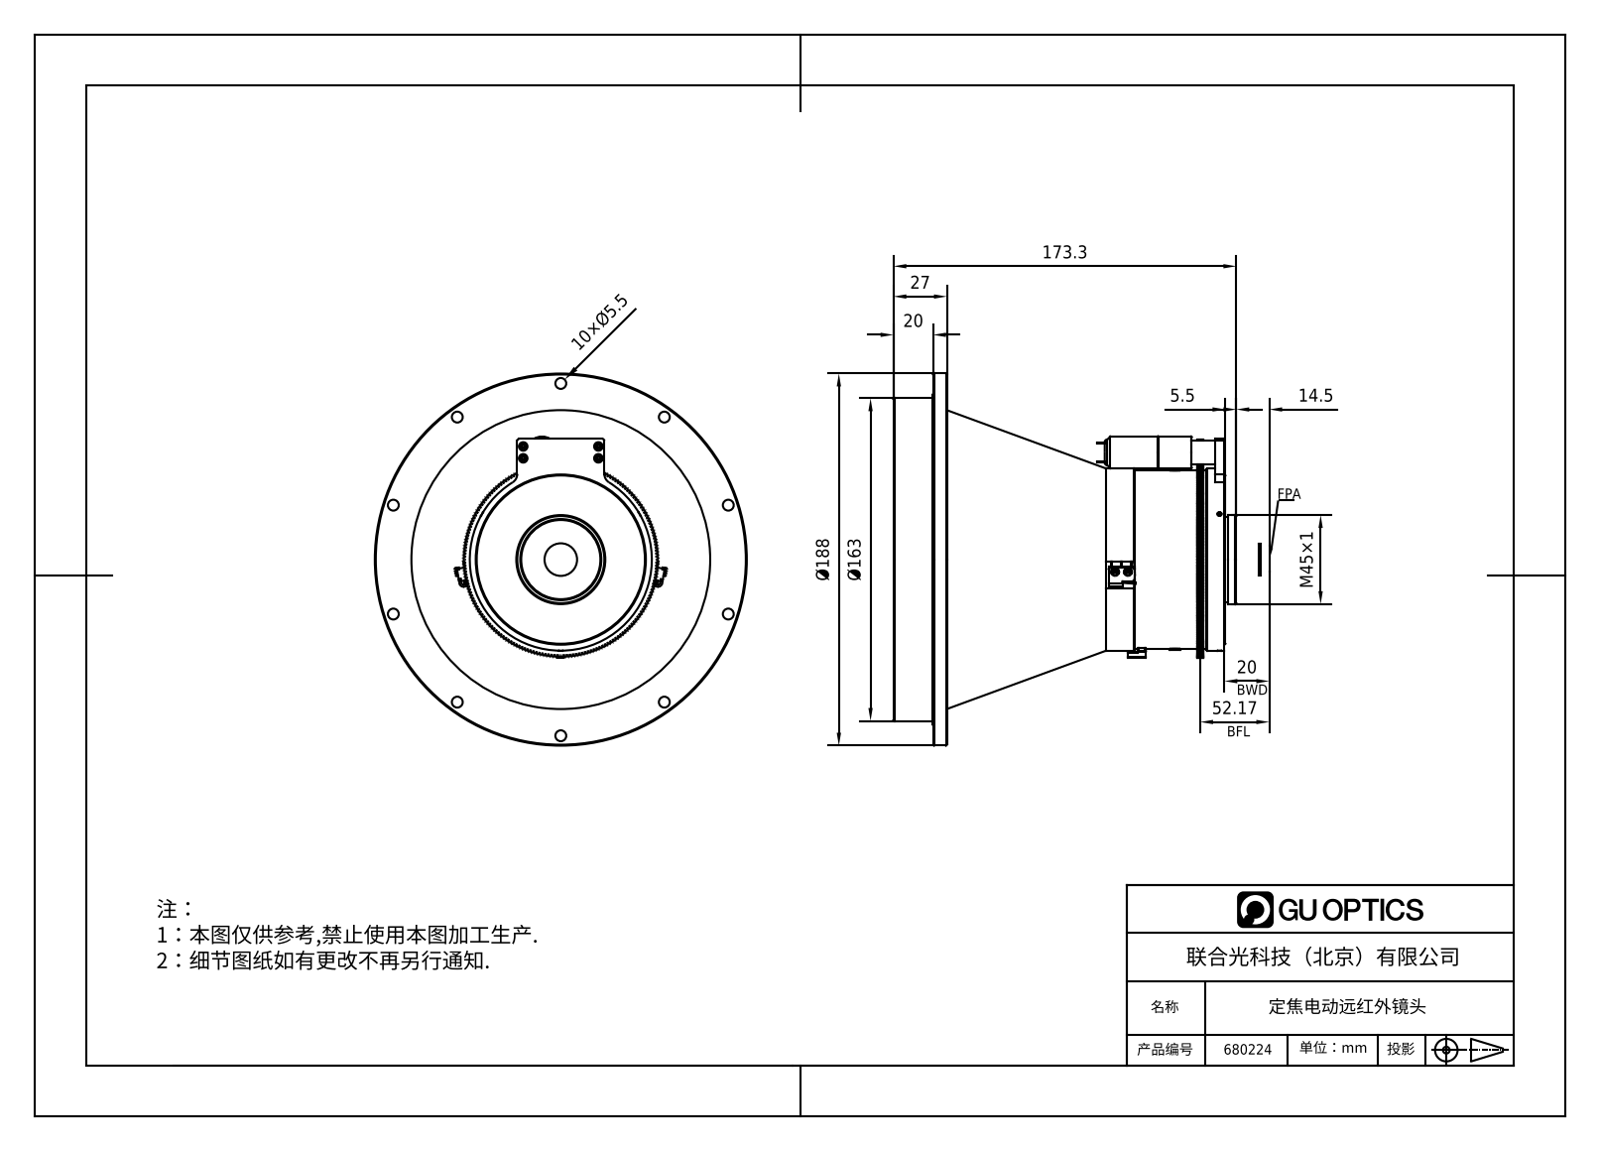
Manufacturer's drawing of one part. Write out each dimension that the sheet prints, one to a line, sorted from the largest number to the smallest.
Ø188
173.3
Ø163
52.17
M45×1
27
20
20
14.5
10×Ø5.5
5.5
